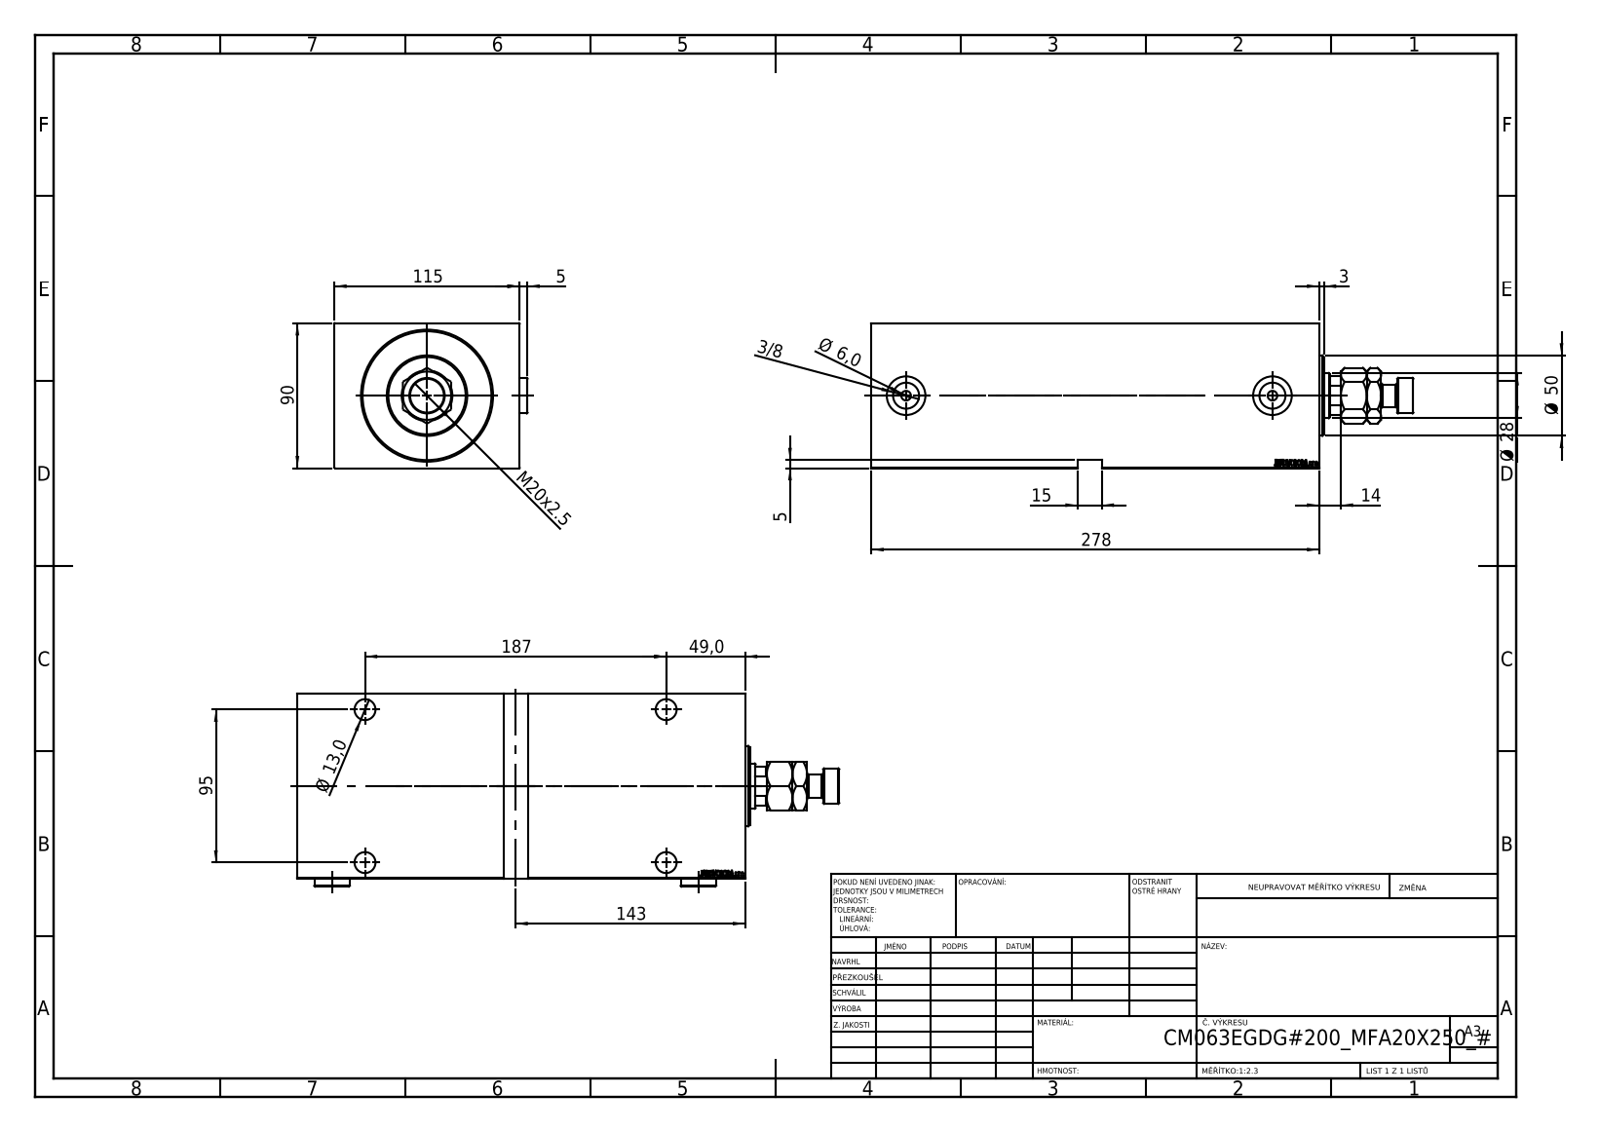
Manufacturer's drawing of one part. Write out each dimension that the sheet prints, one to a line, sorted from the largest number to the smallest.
278
187
143
115
95
90
Ø 50
49,0
Ø 28
M20x2.5
15
14
Ø 13,0
Ø 6,0
5
5
3
3/8
